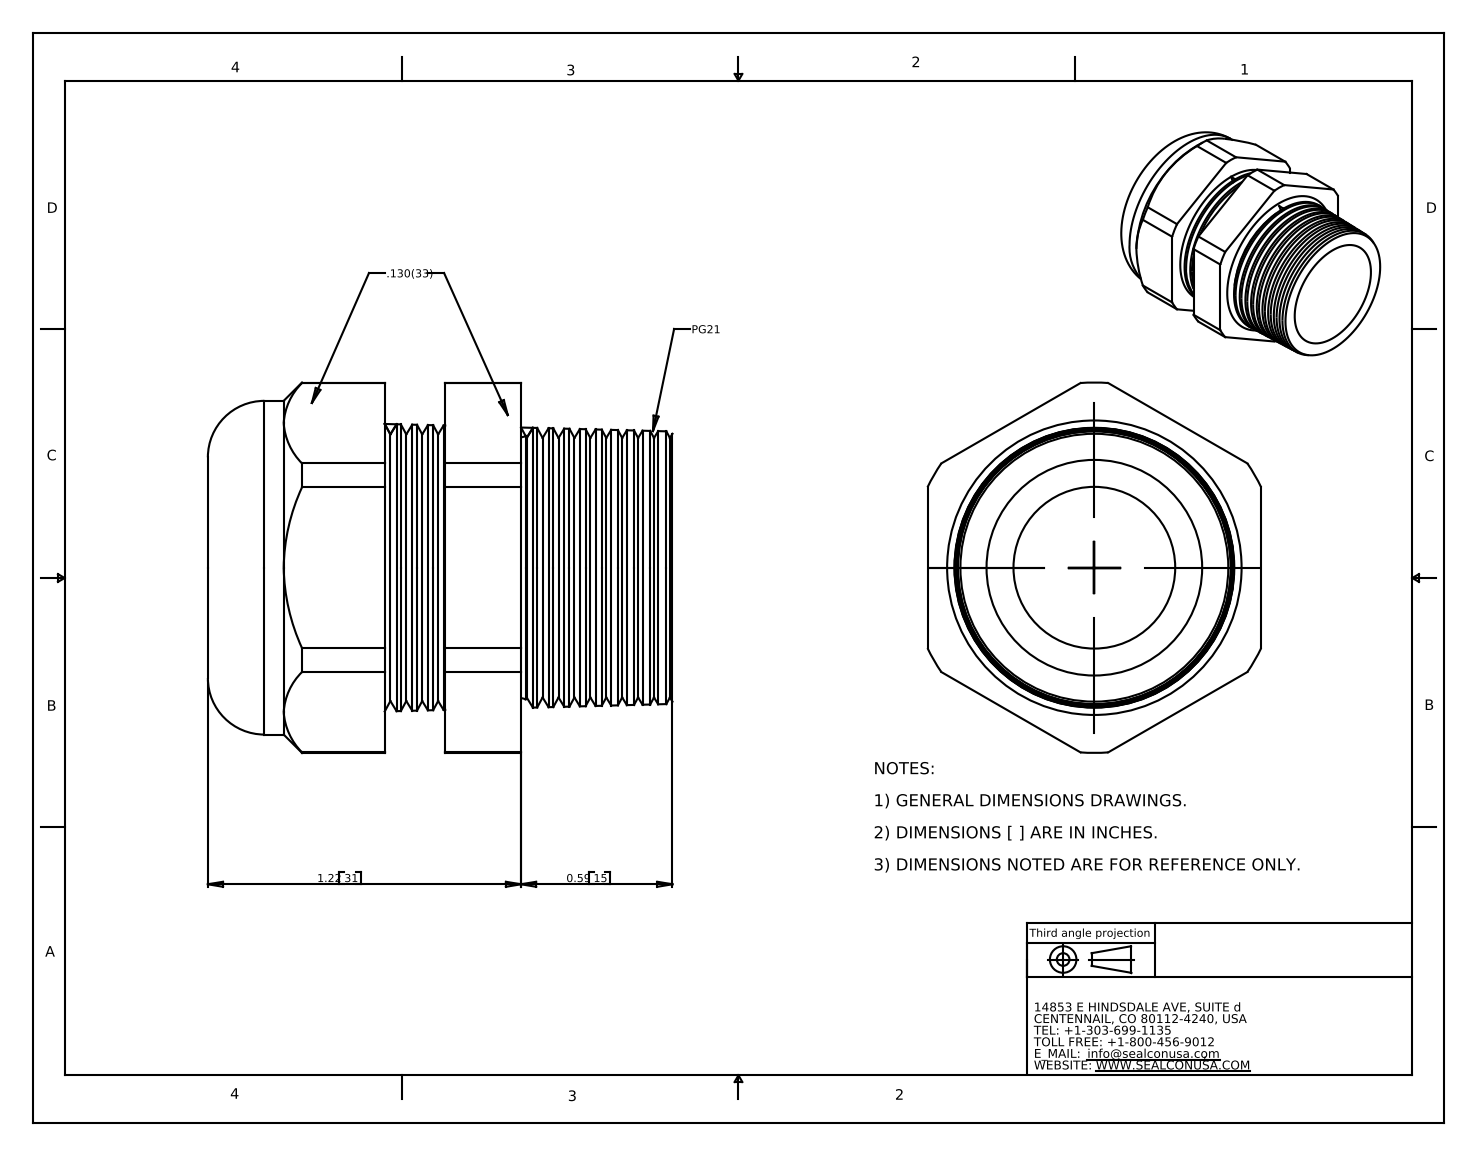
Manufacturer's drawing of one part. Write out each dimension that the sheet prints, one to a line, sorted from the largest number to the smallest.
1.22 31
0.59 15
